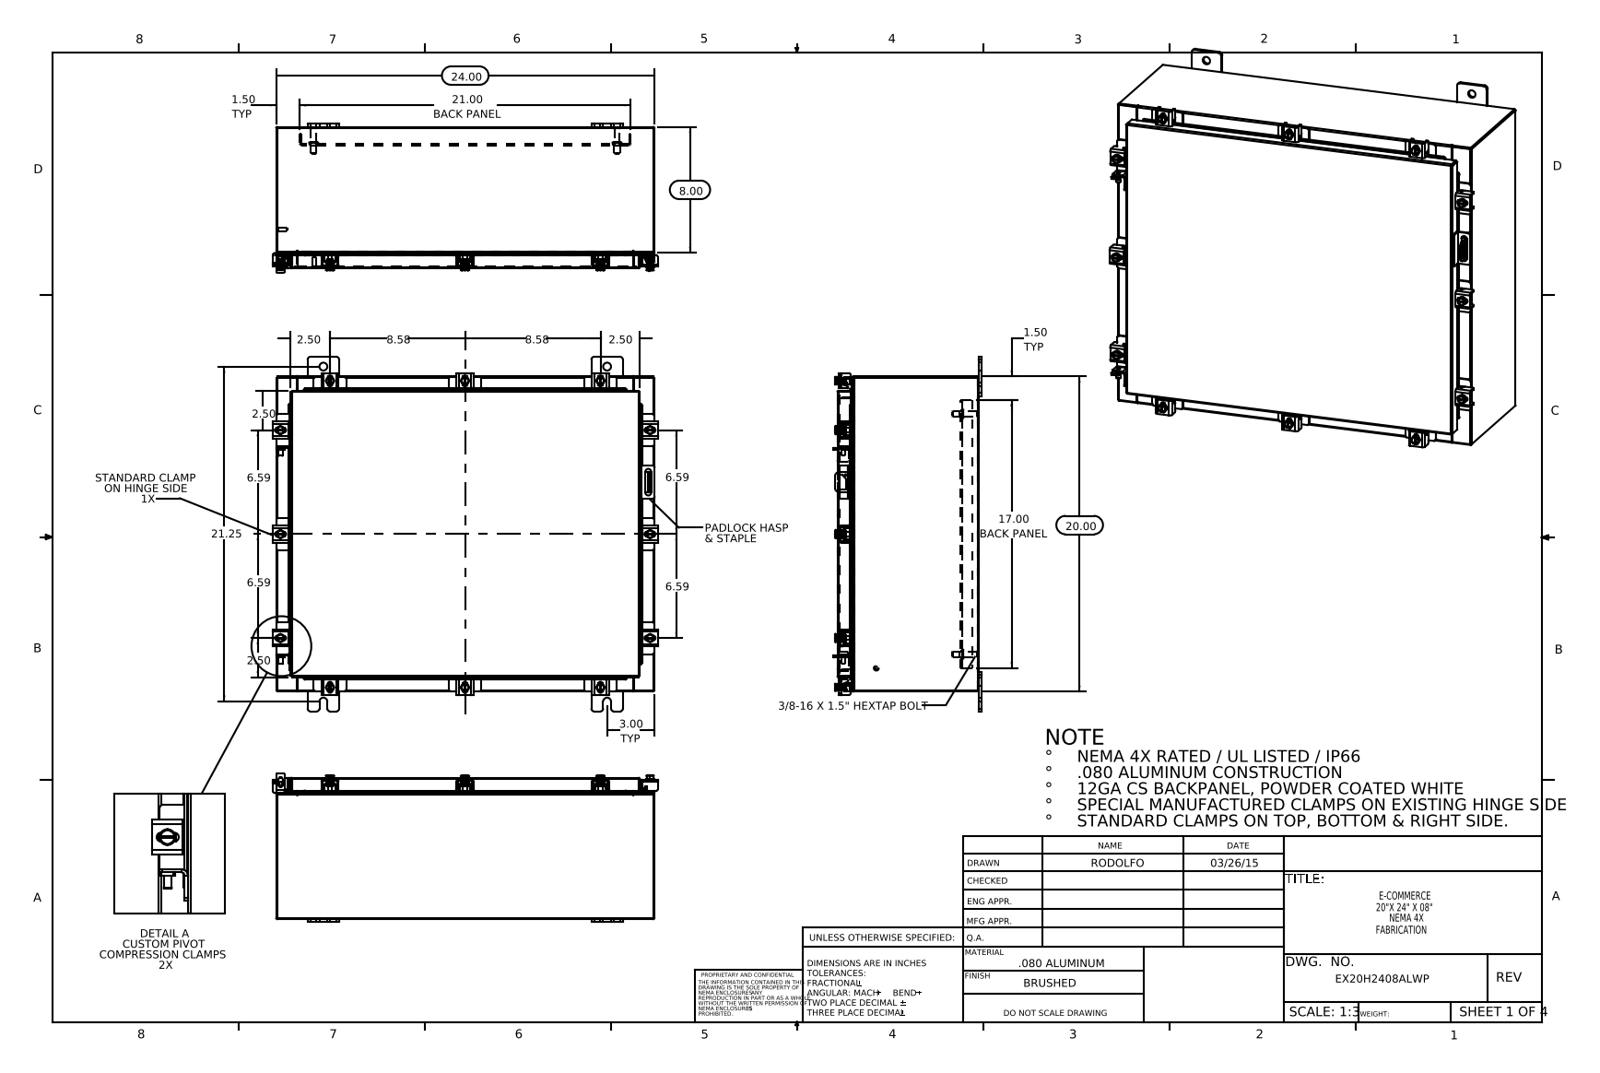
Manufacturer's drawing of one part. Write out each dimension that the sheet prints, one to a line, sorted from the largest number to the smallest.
24.00
21.25
21.00 BACK PANEL
20.00
17.00 BACK PANEL
8.58
8.58
8.00
6.59
6.59
6.59
6.59
3.00 TYP
2.50
2.50
2.50
2.50
1.50 TYP
1.50 TYP
